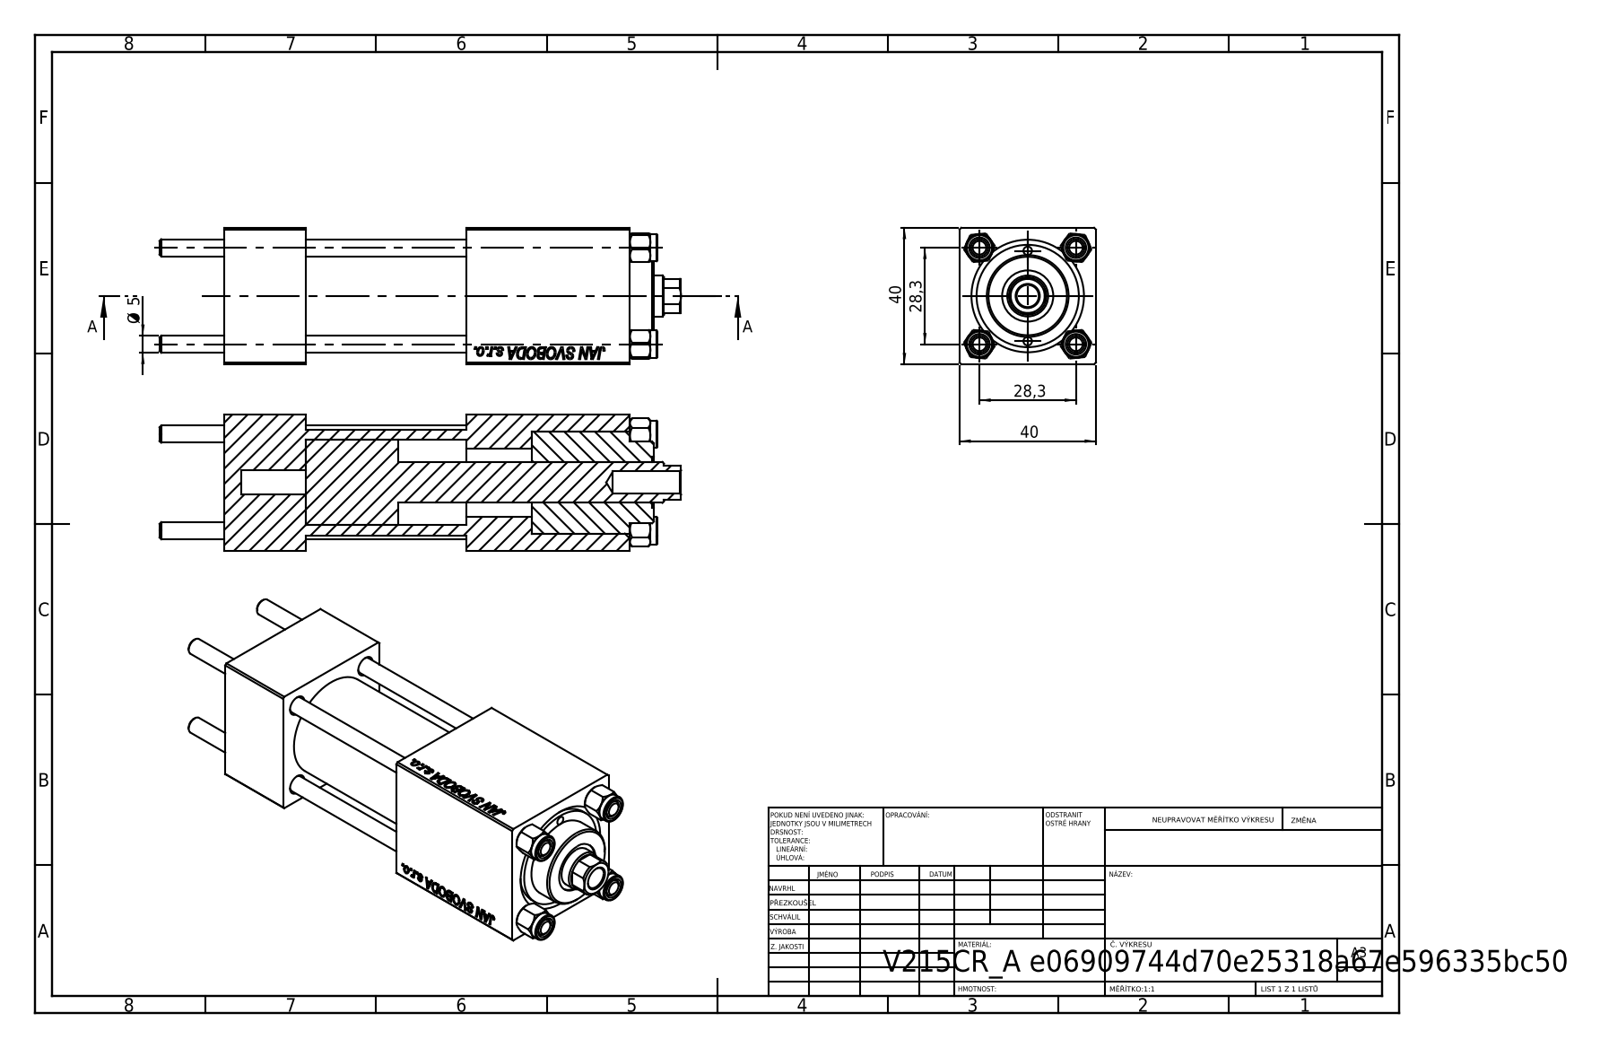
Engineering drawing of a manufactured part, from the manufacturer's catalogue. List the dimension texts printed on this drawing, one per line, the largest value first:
40
40
28,3
28,3
Ø 5
